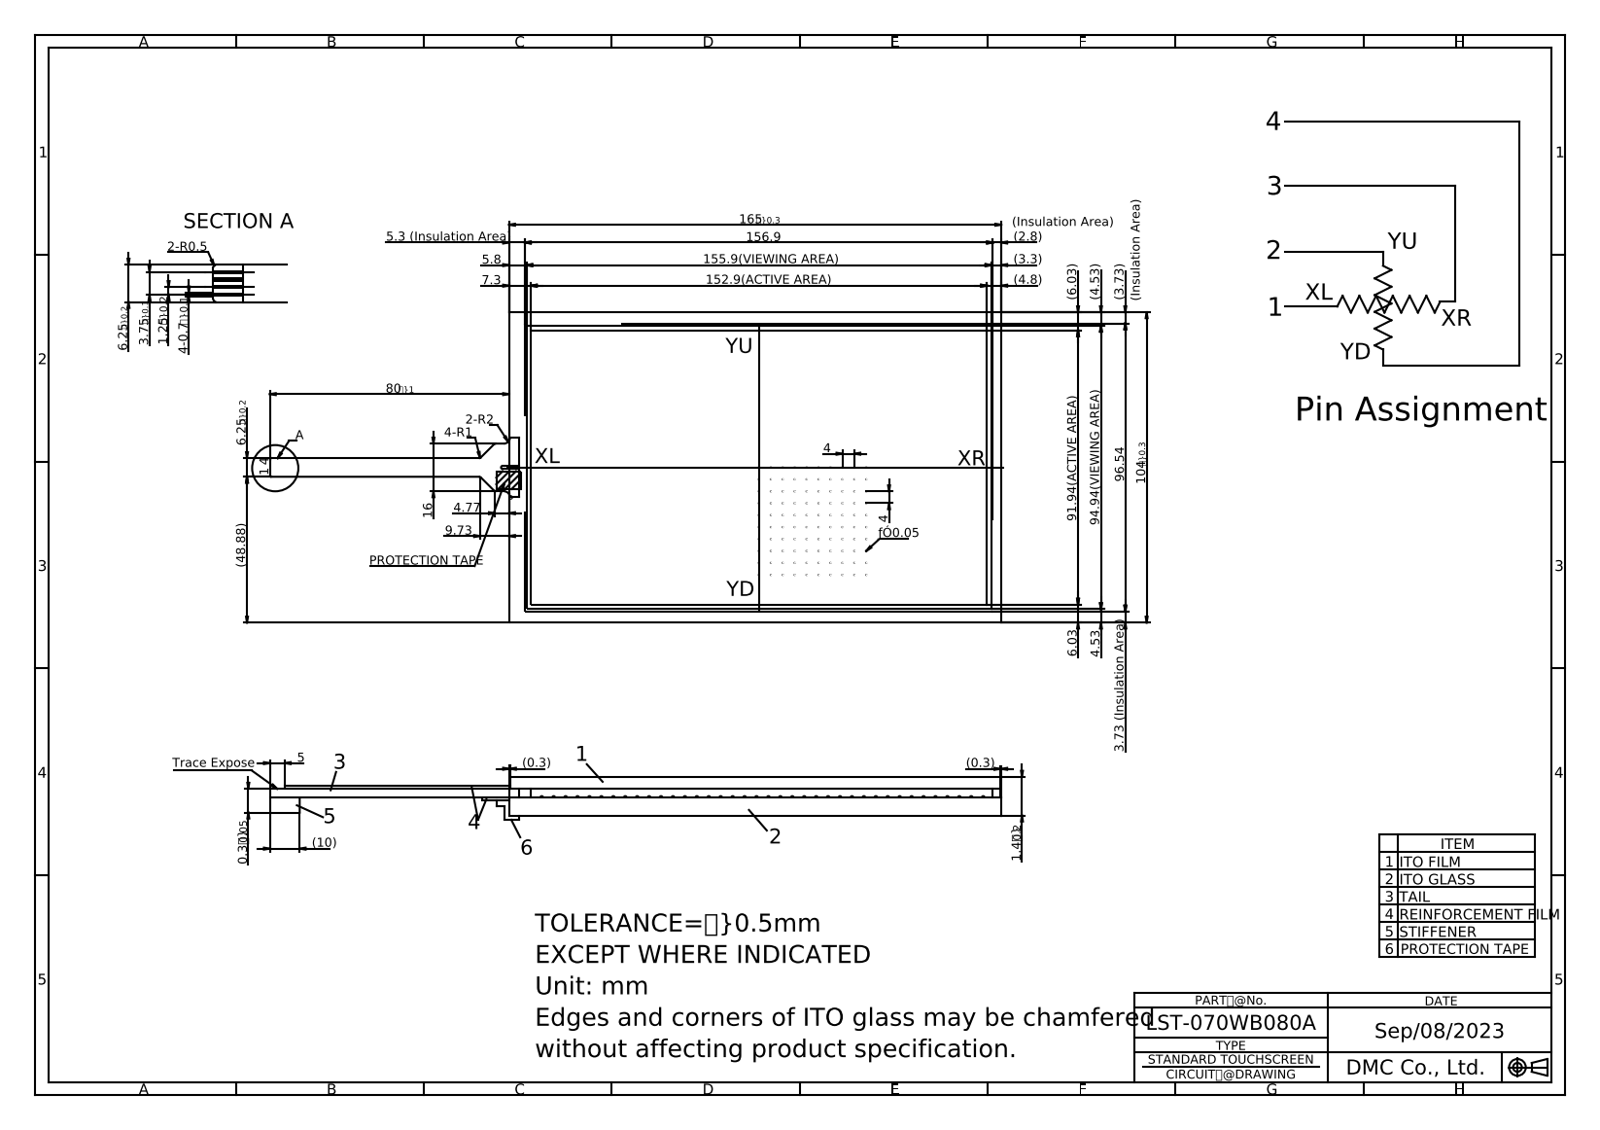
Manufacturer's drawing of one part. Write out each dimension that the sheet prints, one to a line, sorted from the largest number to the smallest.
165.00
156.9
155.9(VIEWING AREA)
152.9(ACTIVE AREA)
104.00
96.54
94.94(VIEWING AREA)
91.94(ACTIVE AREA)
80.20
(48.88)
16
(10)
9.73
7.3
6.25
6.25{\H0.6667x;?}0.2}
(6.03)
6.03
5.8
5.3 (Insulation Area)
5
(4.8)
4.77
(4.53)
4.53
4
4
4-0.7{\H0.83333x;?}0.1}
3.75{\H0.66667x;?}0.1}
(3.73)
3.73 (Insulation Area)
(3.3)
(2.8)
1.4±{\H0.83333x;0.2}
1.25{\H0.83333x;?}0.2}
(0.3)
(0.3)
0.3±{\H0.83333x;0.05}
